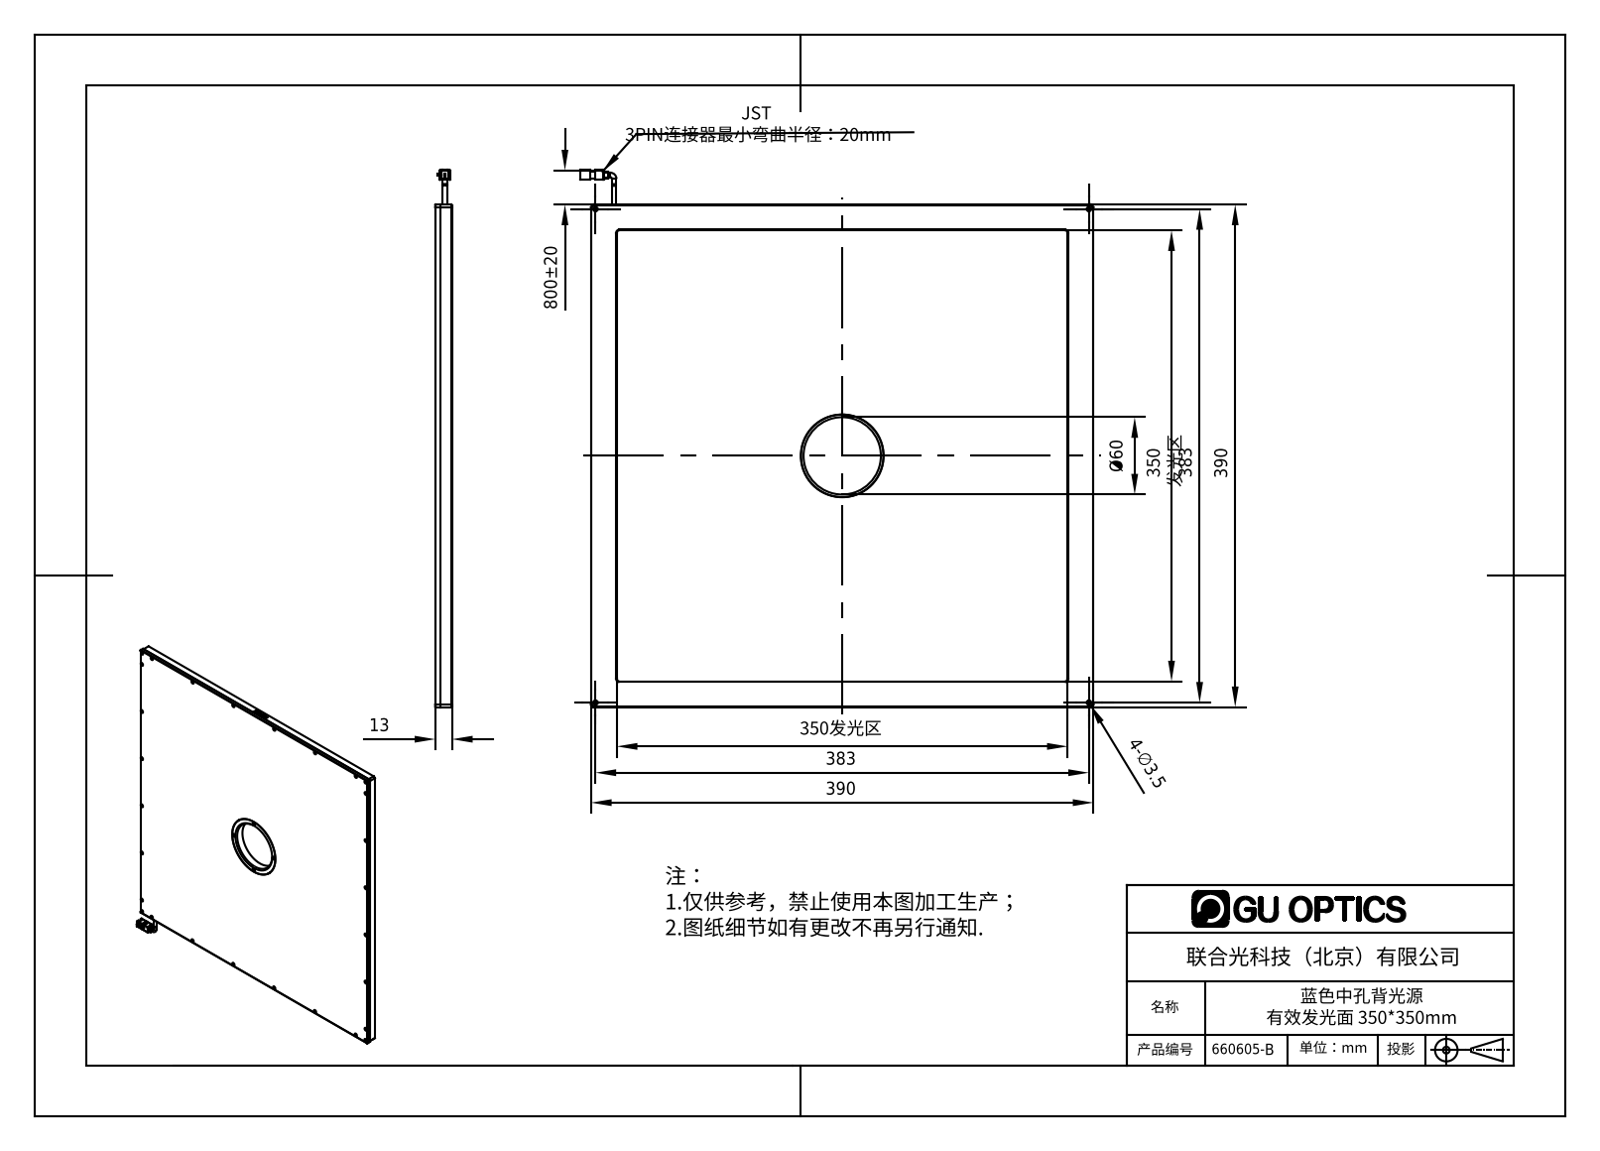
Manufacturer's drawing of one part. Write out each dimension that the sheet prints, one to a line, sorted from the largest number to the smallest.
800±20
390
390
383
383
350 发光区
350发光区
Ø60
13
4-∅3.5
